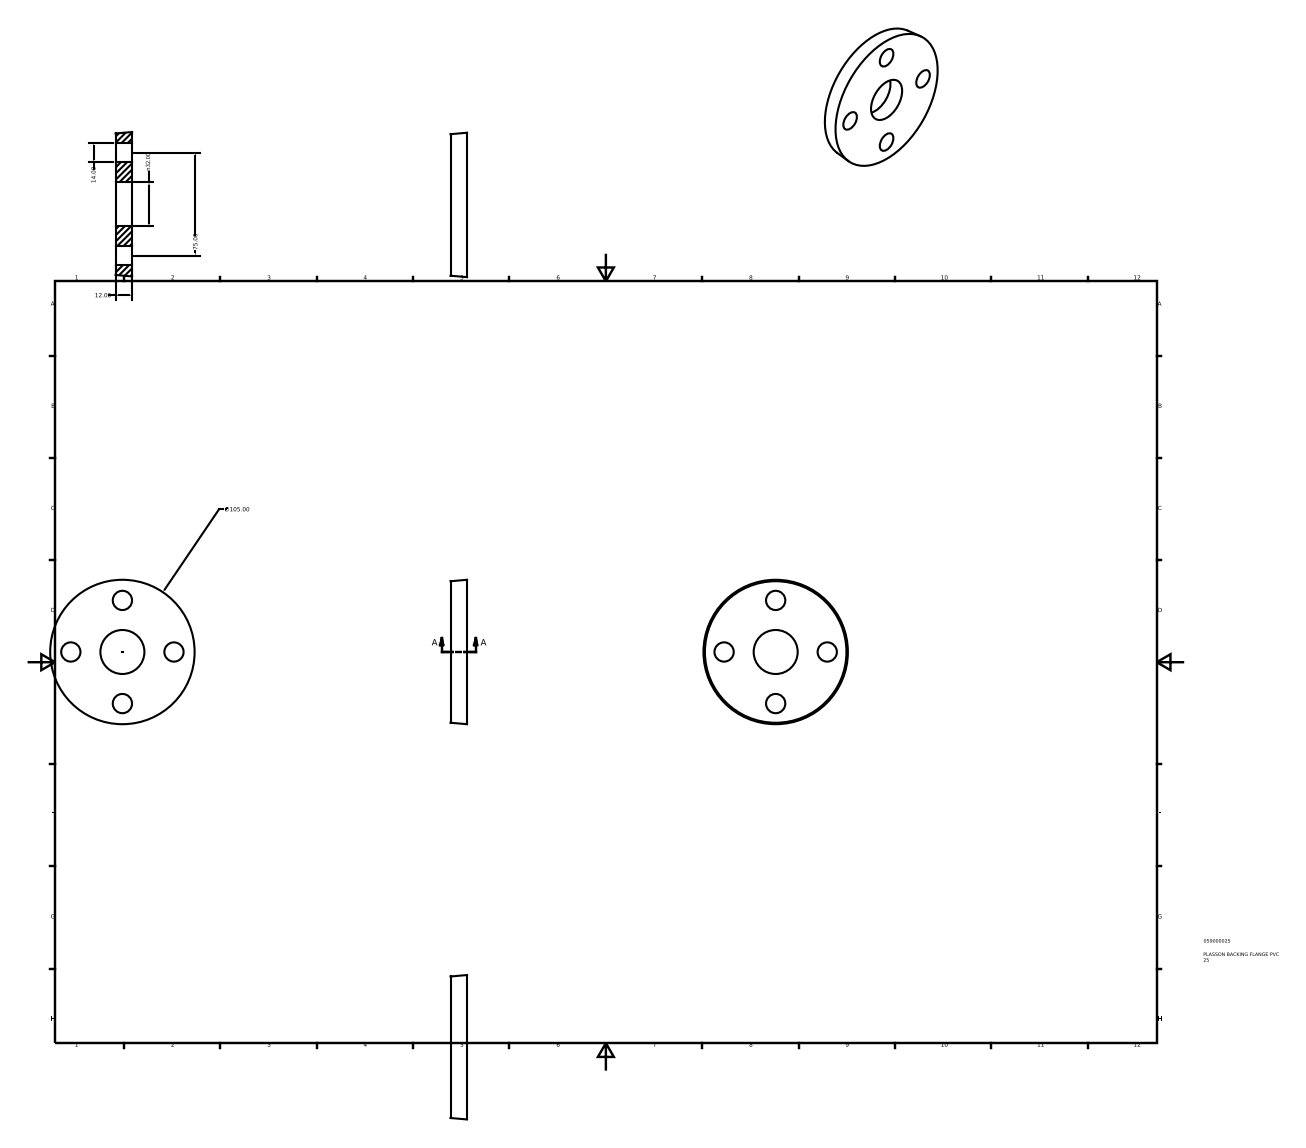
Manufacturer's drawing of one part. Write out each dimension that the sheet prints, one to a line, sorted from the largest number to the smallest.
∅105.00
75.00
n32.00
14.00
12.00
